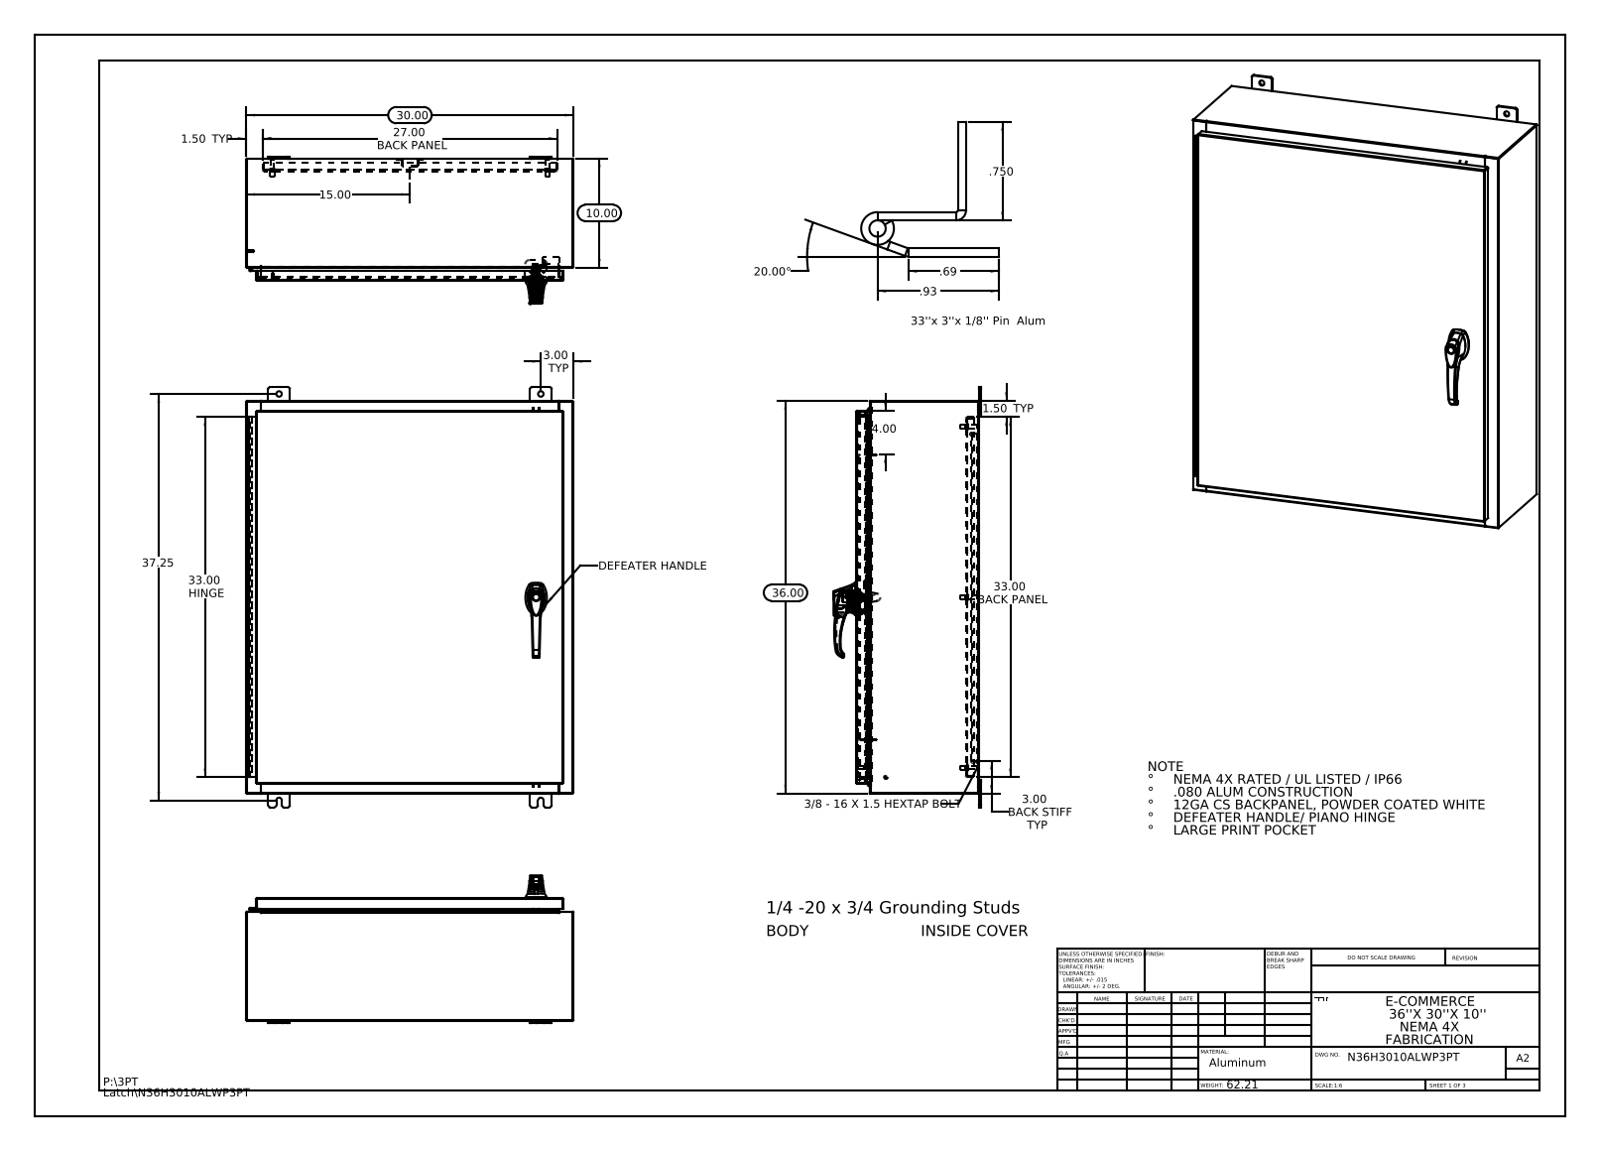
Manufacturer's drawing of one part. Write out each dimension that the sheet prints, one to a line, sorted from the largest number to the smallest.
37.25
36.00
33.00 HINGE
33.00 BACK PANEL
30.00
27.00 BACK PANEL
20.00°
15.00
10.00
4.00
3.00 TYP
3.00 BACK STIFF TYP
1.50 TYP
1.50 TYP
.93
.750
.69
